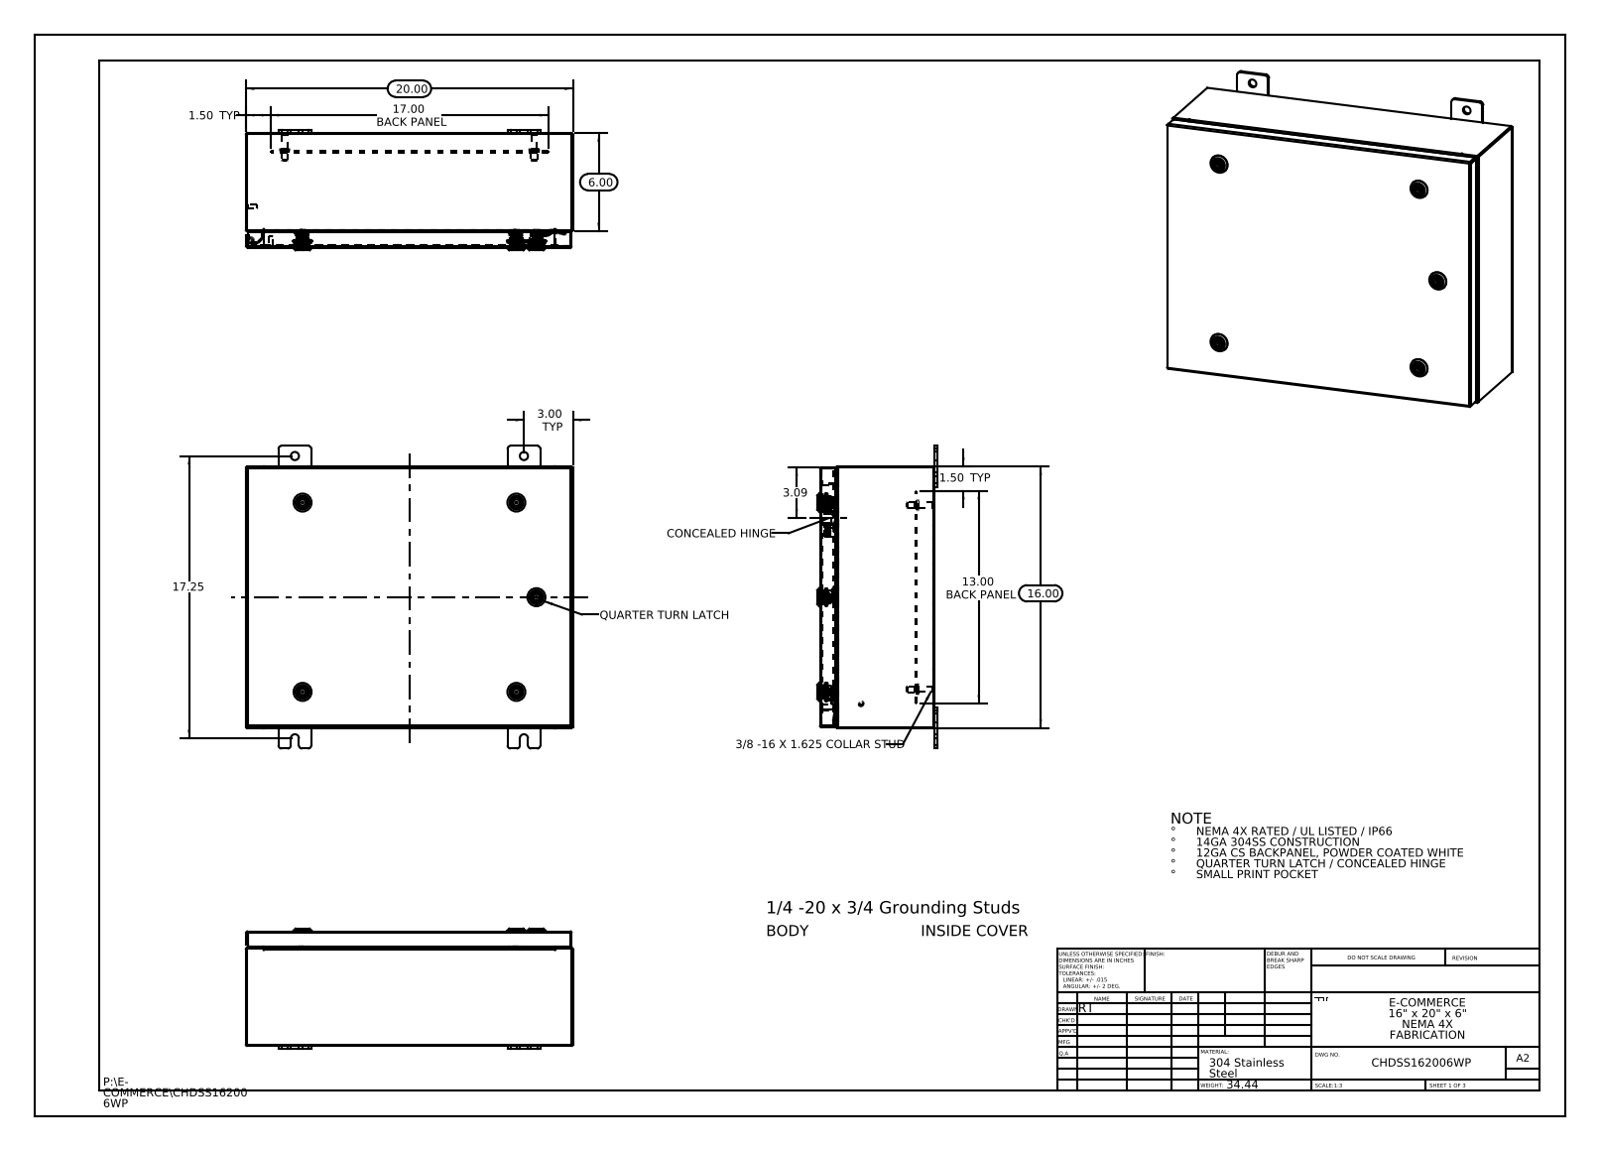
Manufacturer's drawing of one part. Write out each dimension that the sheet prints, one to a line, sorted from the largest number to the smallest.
20.00
17.25
17.00 BACK PANEL
16.00
13.00 BACK PANEL
6.00
3.09
3.00 TYP
1.50 TYP
1.50 TYP
